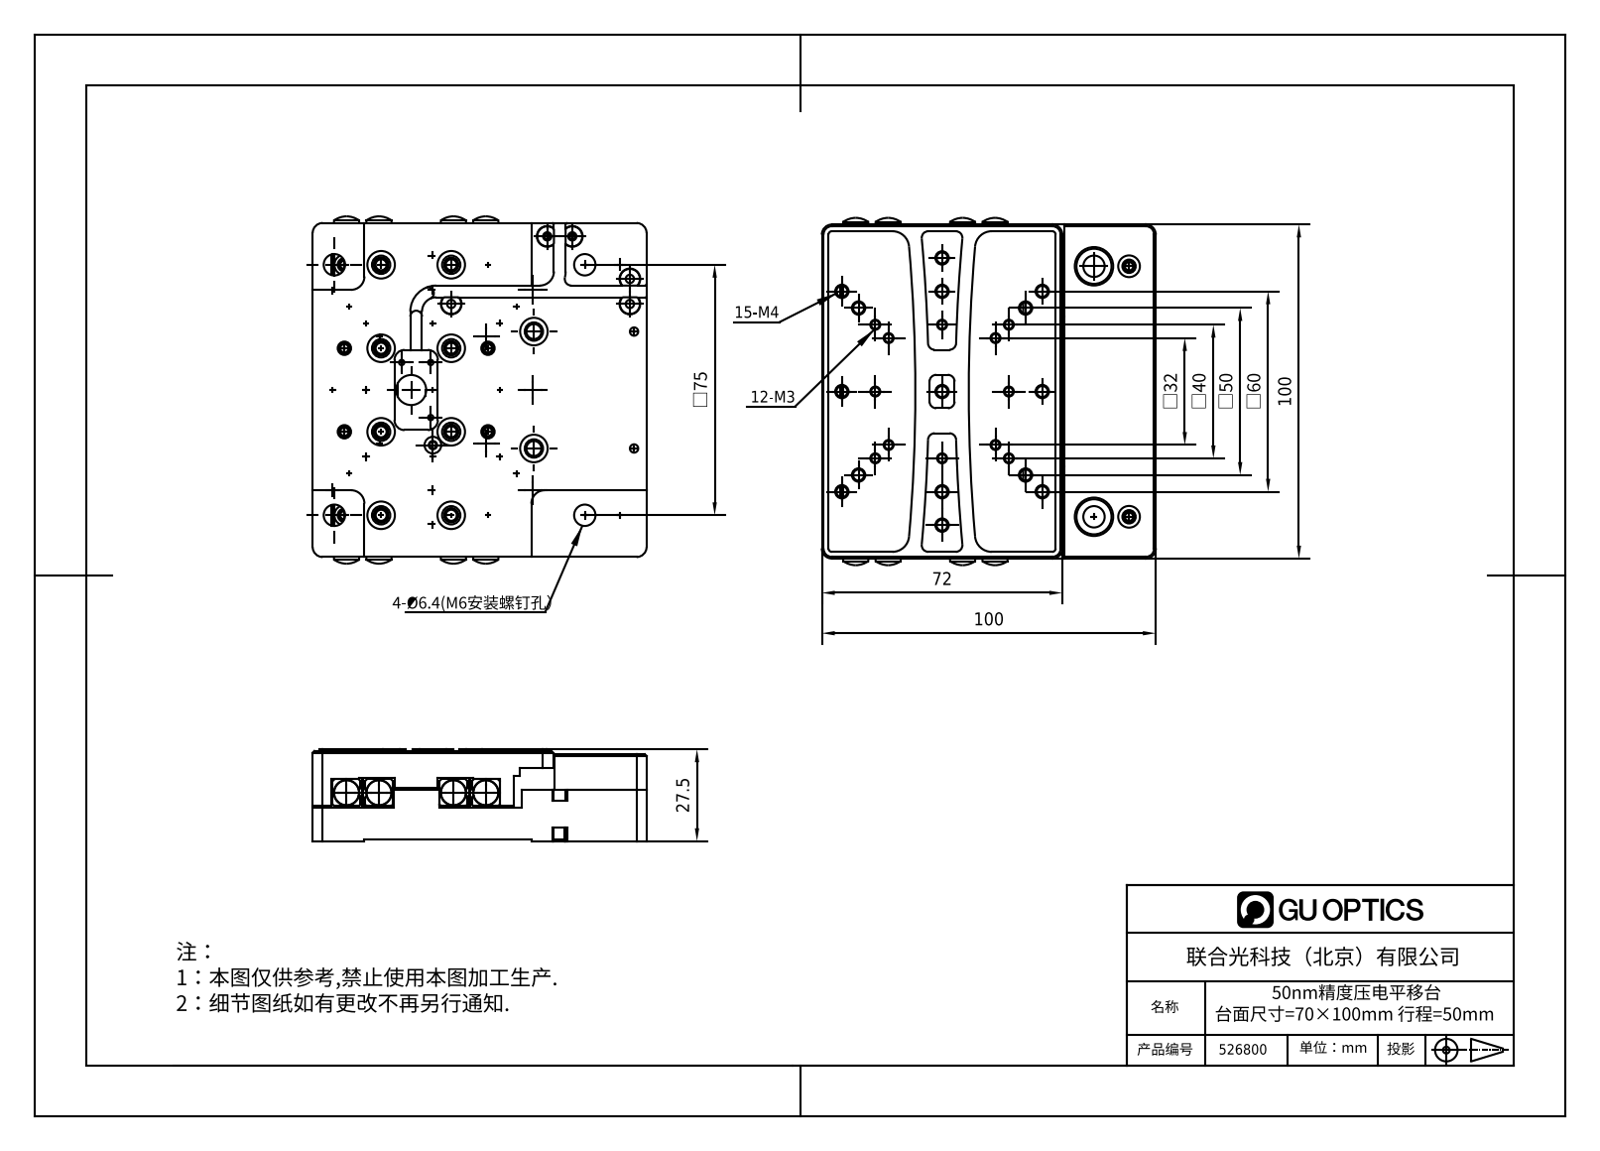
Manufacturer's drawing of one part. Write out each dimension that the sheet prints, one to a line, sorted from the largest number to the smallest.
100
100
□75
72
□60
□50
□40
□32
27.5
